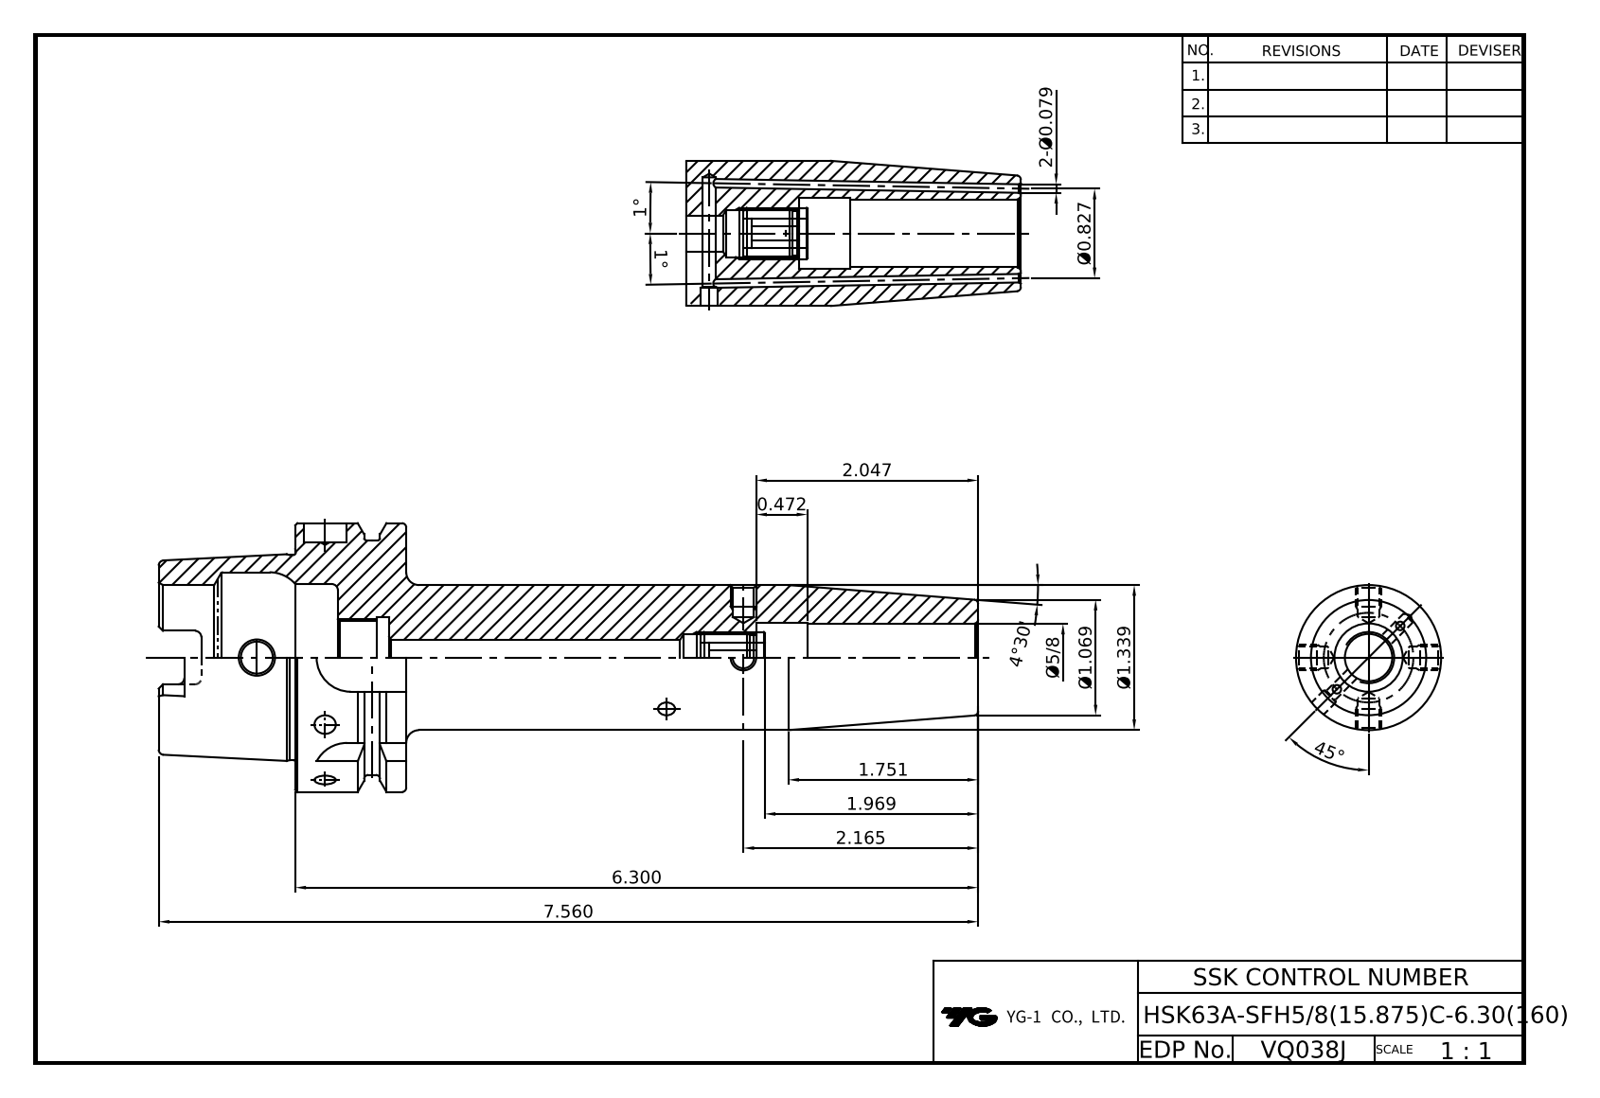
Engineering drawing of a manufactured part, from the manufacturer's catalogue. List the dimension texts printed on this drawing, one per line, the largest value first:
45°
7.560
6.300
4°30'
2.165
2.047
1.969
1.751
Ø1.339
Ø1.069
1°
1°
Ø0.827
0.472
2-Ø0.079
